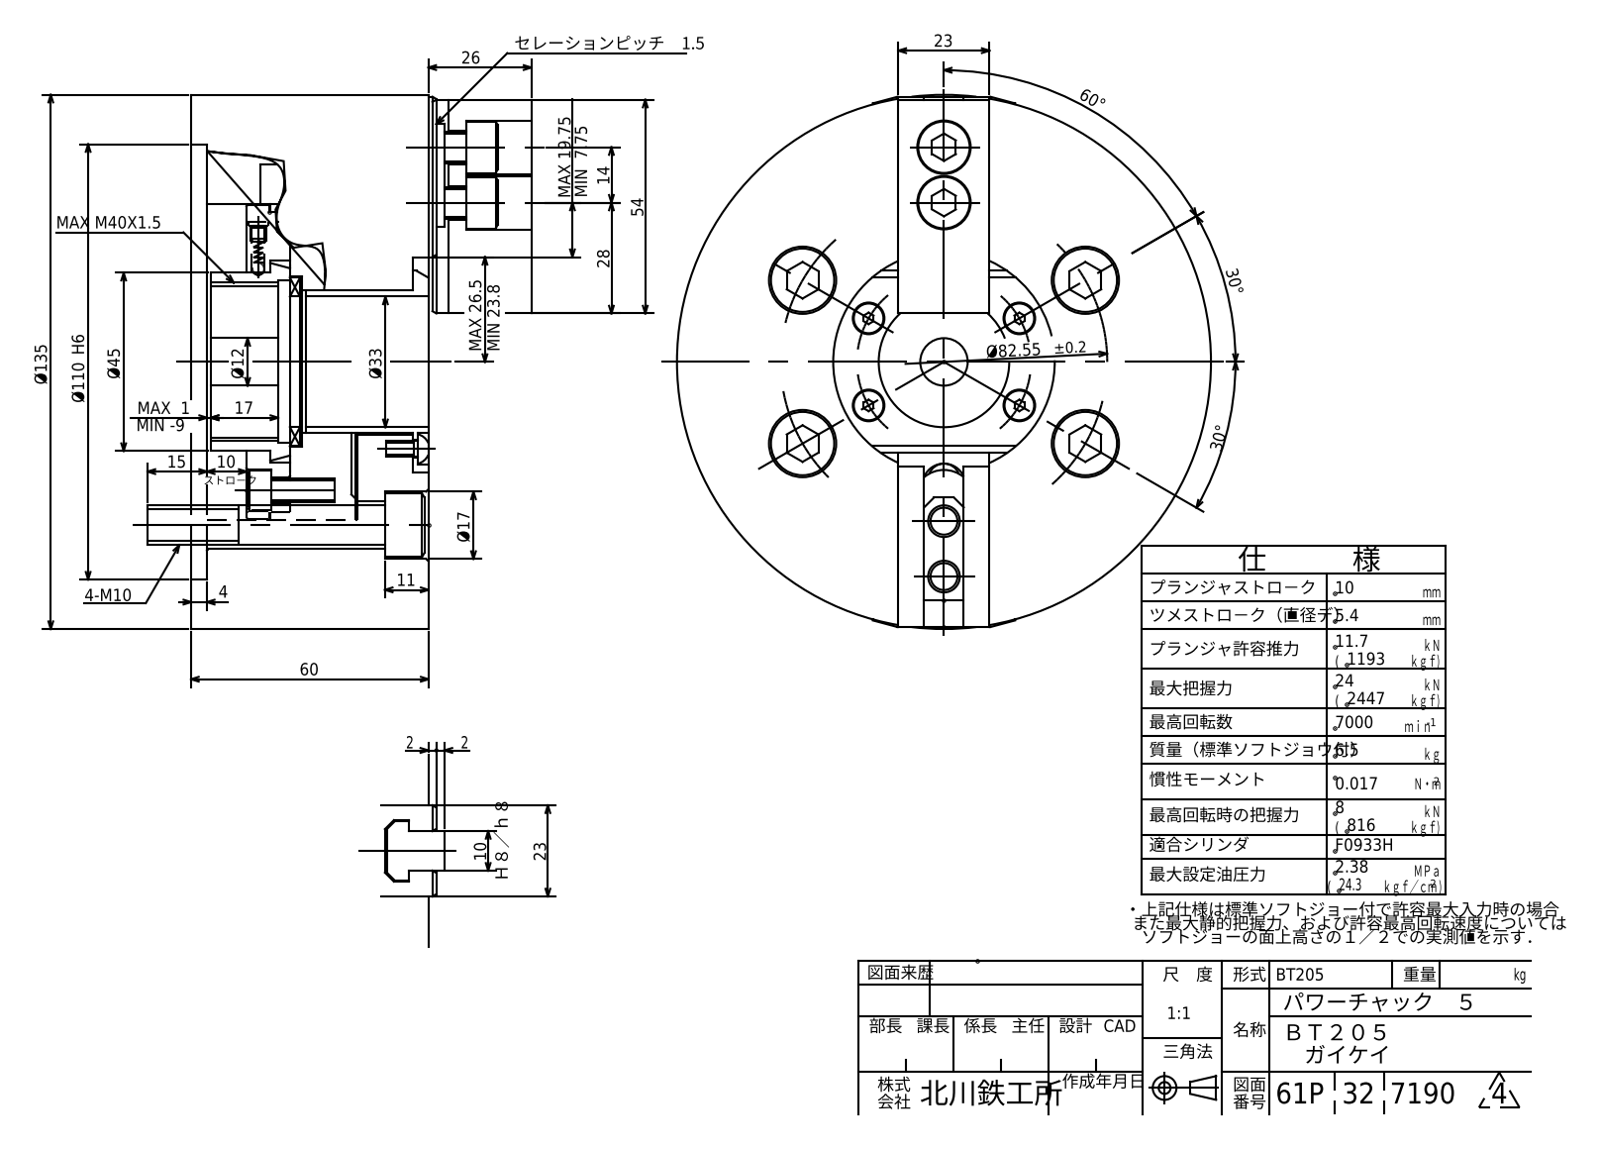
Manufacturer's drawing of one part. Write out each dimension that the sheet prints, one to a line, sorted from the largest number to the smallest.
Ø135
Ø110
Ø82.55 ±0.2
60
60°
54
Ø45
Ø33
30°
30°
28
MAX 26.5
26
23
23
MAX 19.75
Ø17
17
15
14
Ø12
11
10
10
4
2
2
MAX 1
